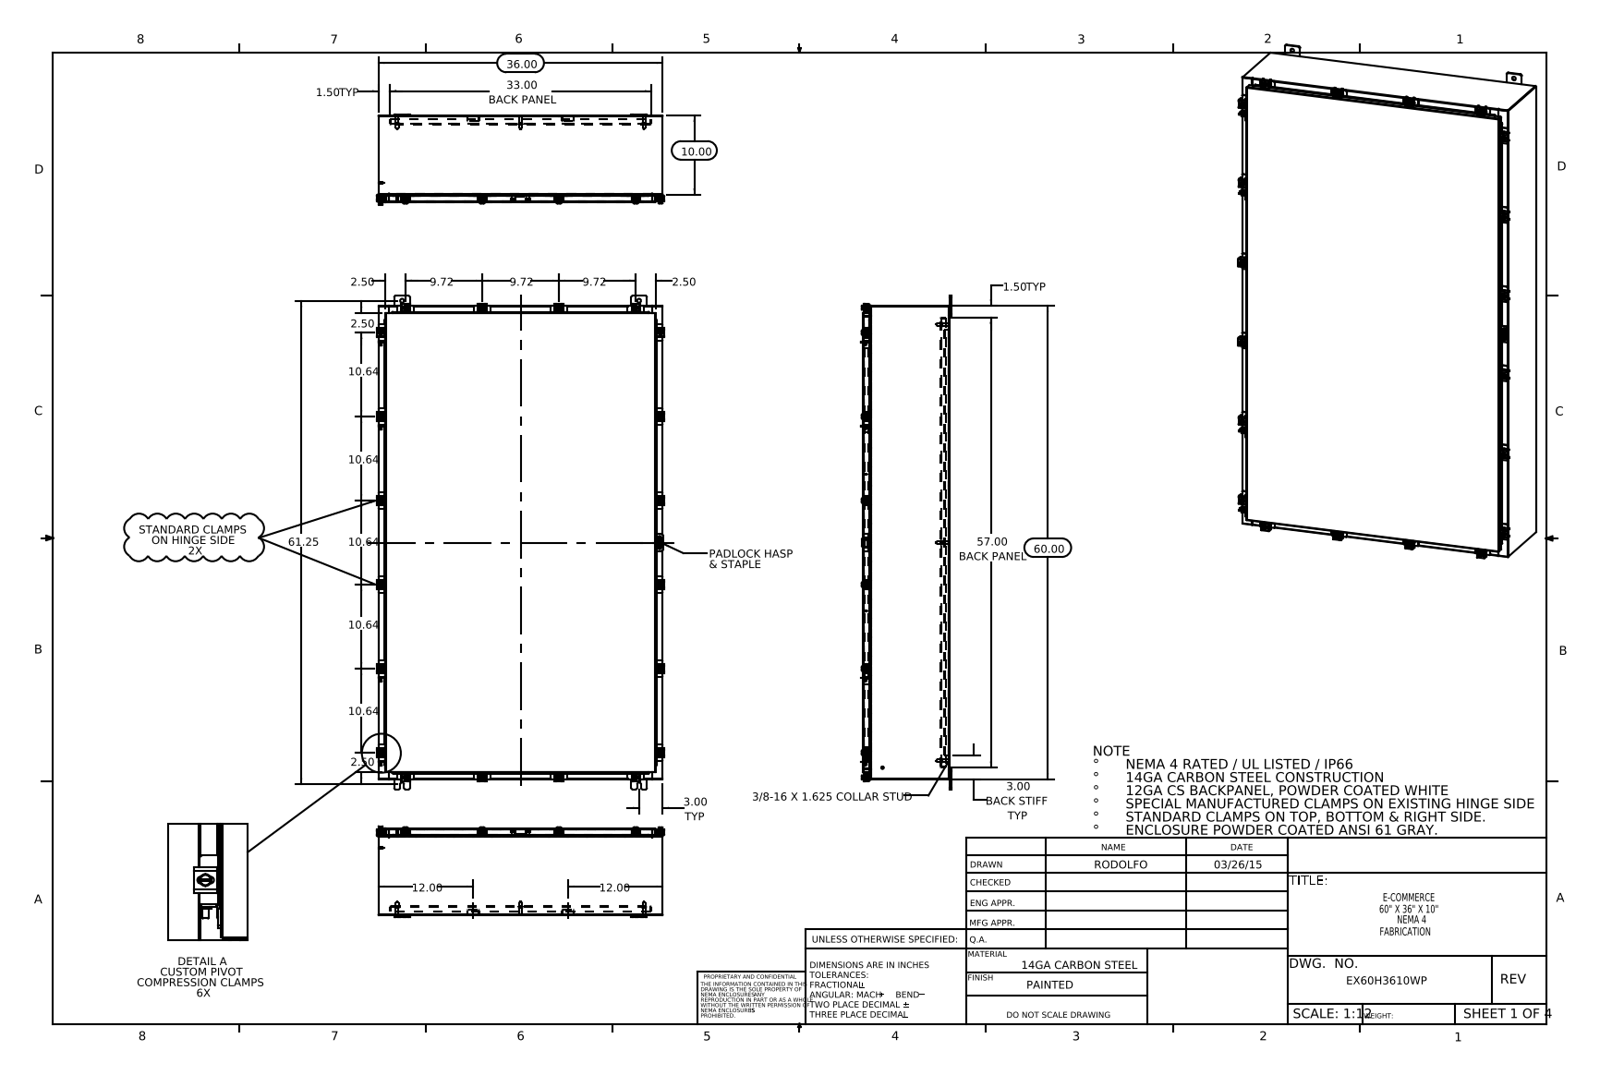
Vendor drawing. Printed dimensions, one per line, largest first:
61.25
60.00
57.00 BACK PANEL
36.00
33.00 BACK PANEL
12.00
12.00
10.64
10.64
10.64
10.64
10.64
10.00
9.72
9.72
9.72
3.00 TYP
3.00 BACK STIFF TYP
2.50
2.50
2.50
2.50
1.50 TYP
1.50 TYP
